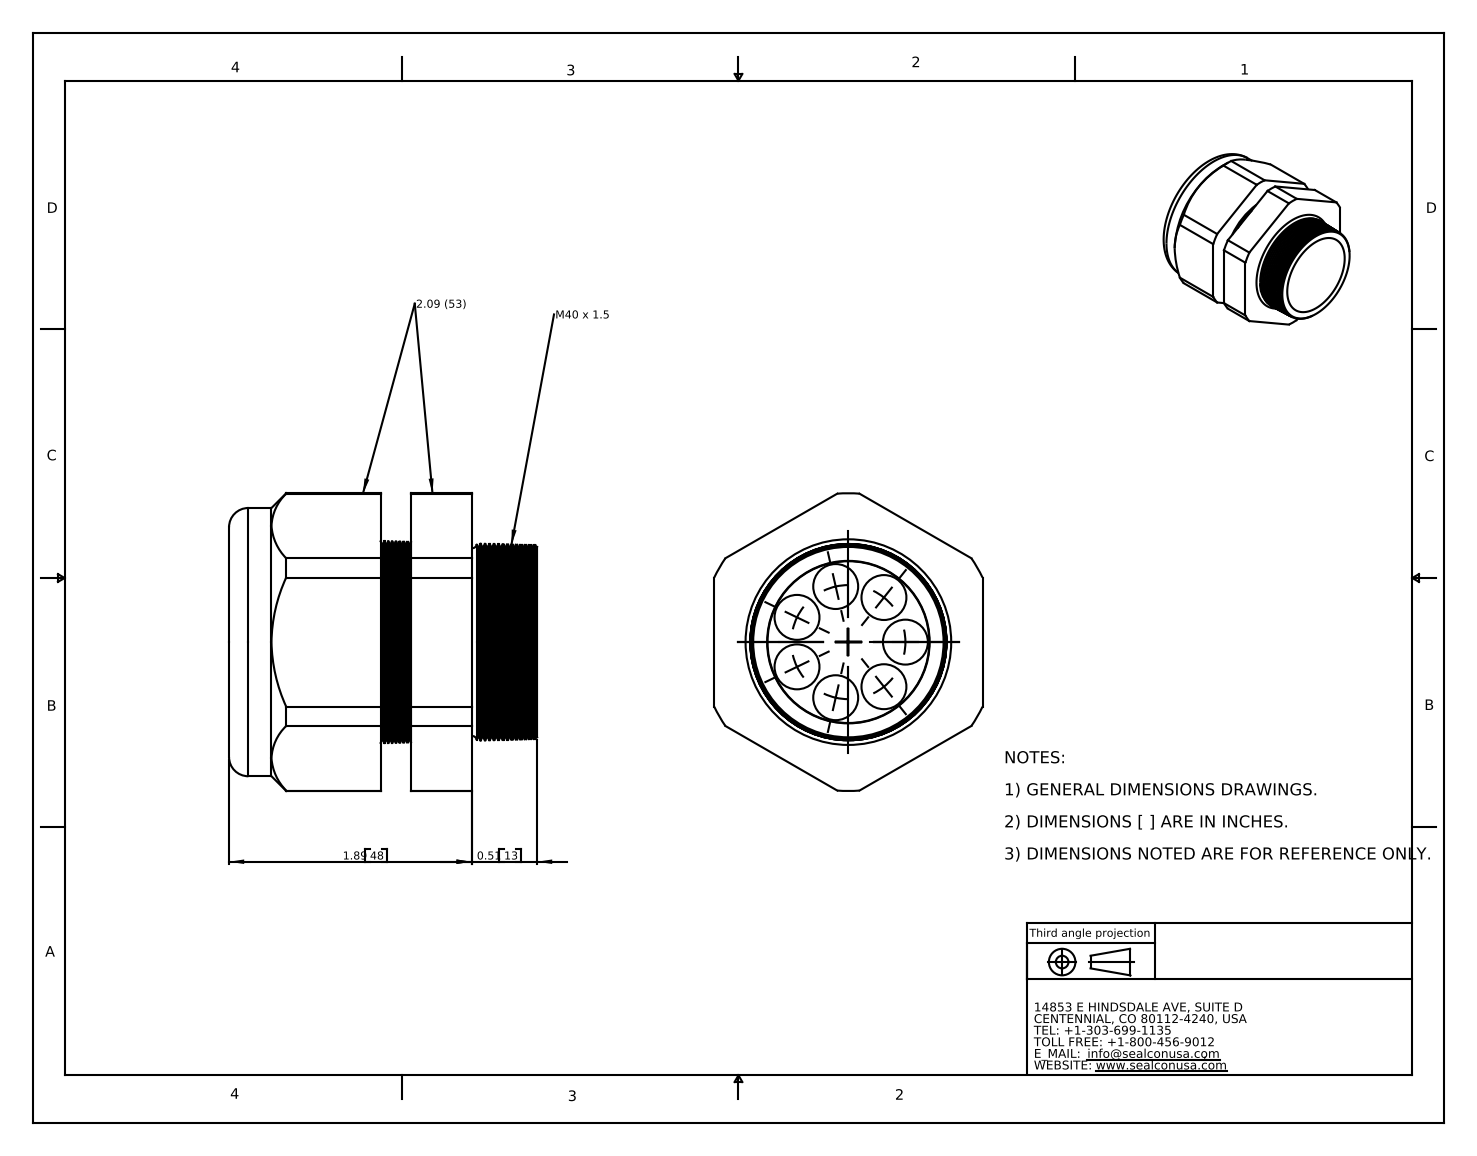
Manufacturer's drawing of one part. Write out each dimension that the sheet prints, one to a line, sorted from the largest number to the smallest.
1.89 48
0.51 13
